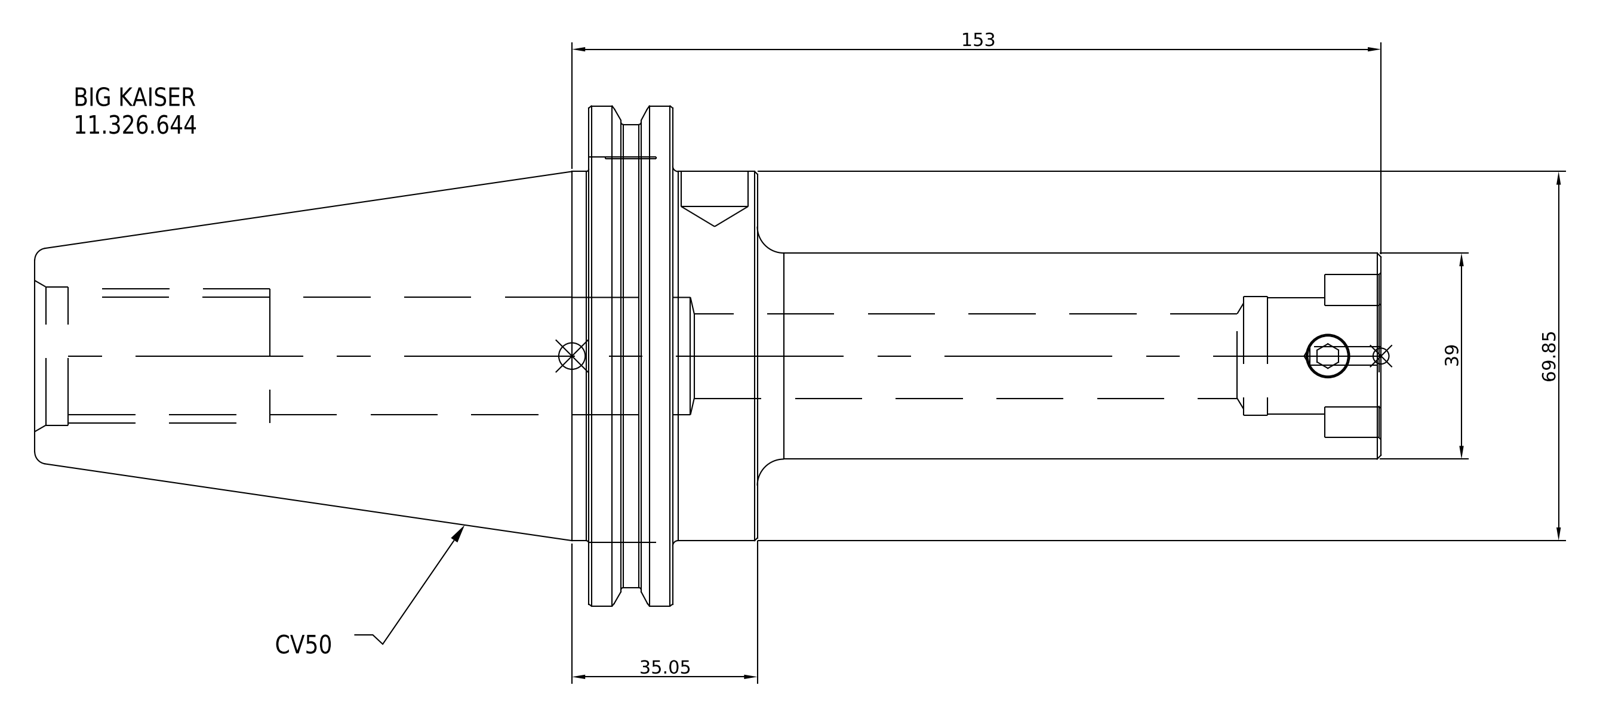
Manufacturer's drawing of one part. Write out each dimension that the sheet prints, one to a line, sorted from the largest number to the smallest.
153
69.85
39
35.05
